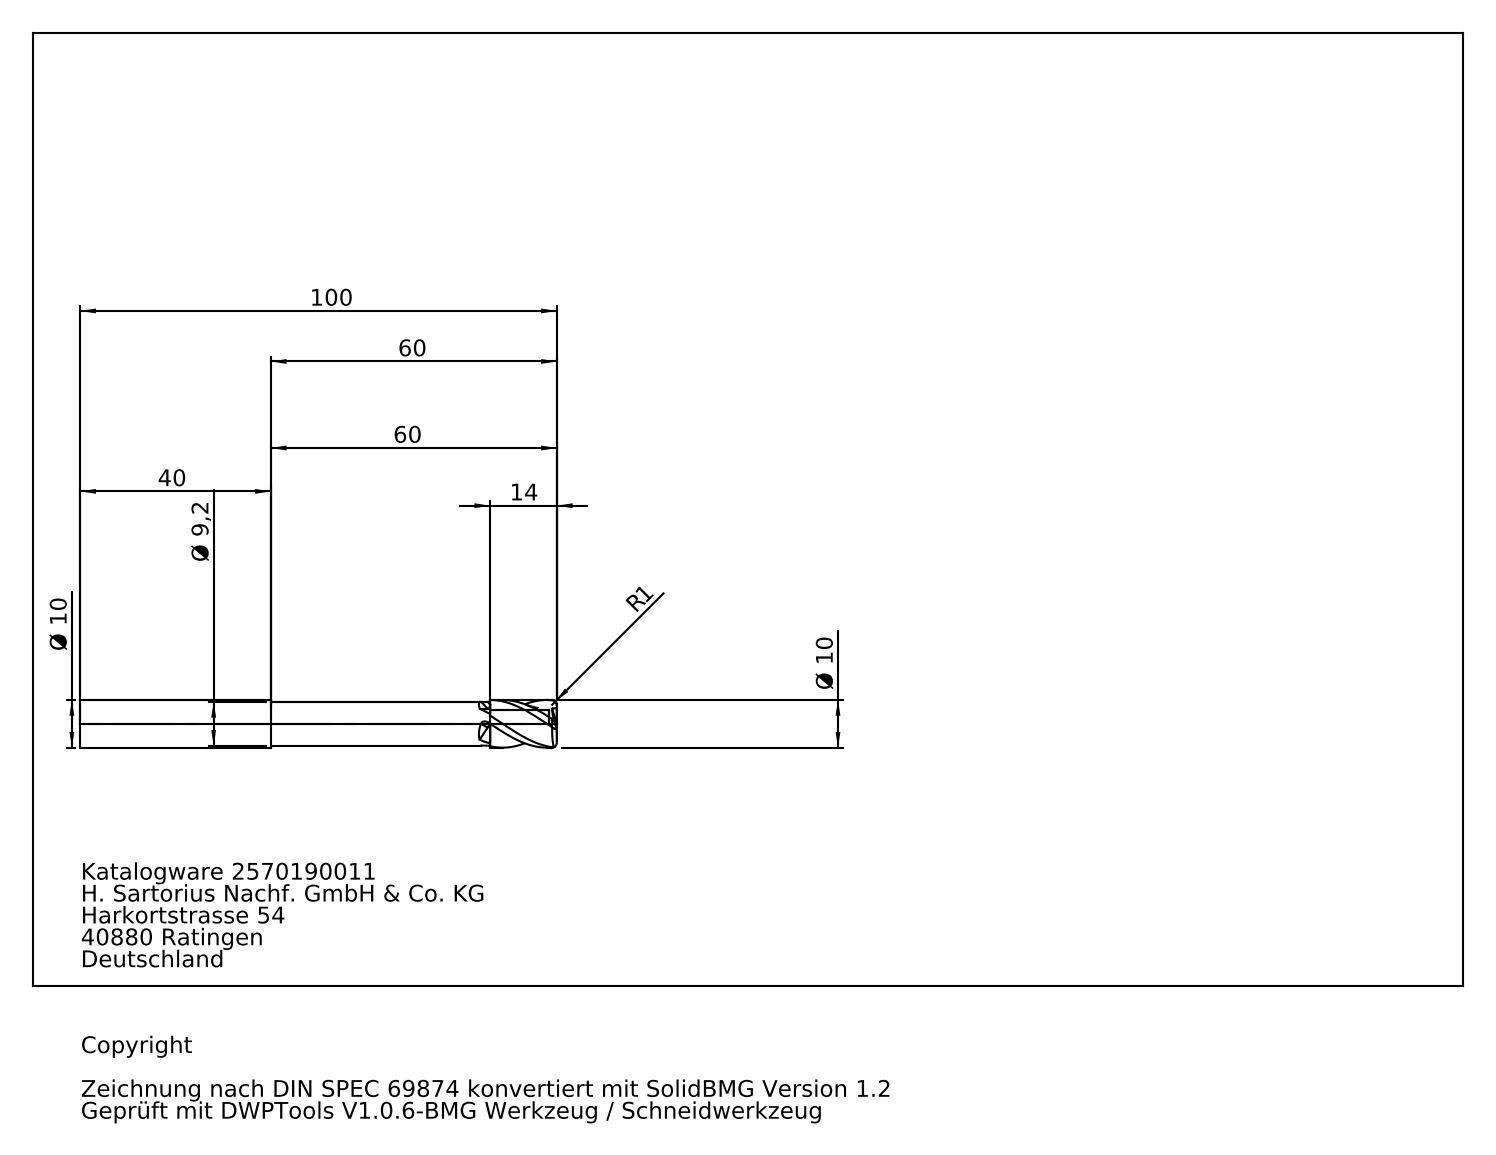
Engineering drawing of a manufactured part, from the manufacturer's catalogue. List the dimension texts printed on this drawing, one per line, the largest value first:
100
60
60
40
14
Ø 10
Ø 10
Ø 9,2
R 1
